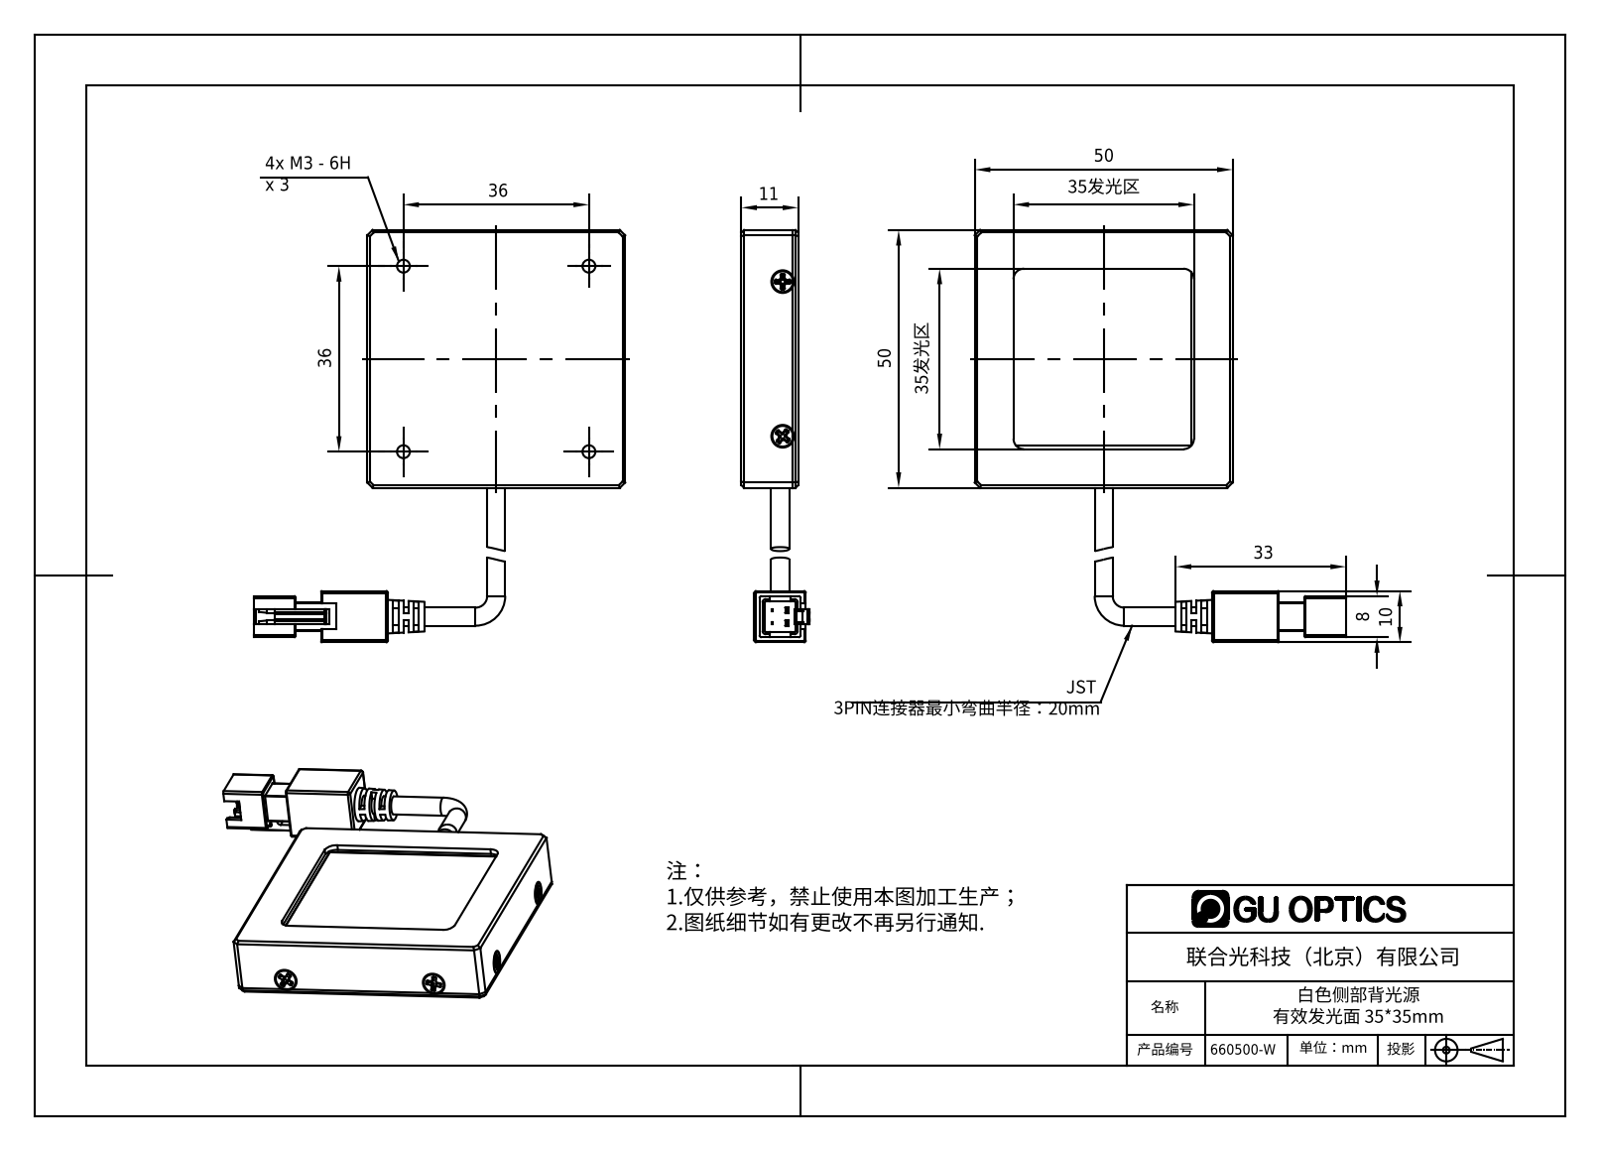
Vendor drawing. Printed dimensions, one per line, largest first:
50
50
36
36
35发光区
35发光区
33
11
10
8
